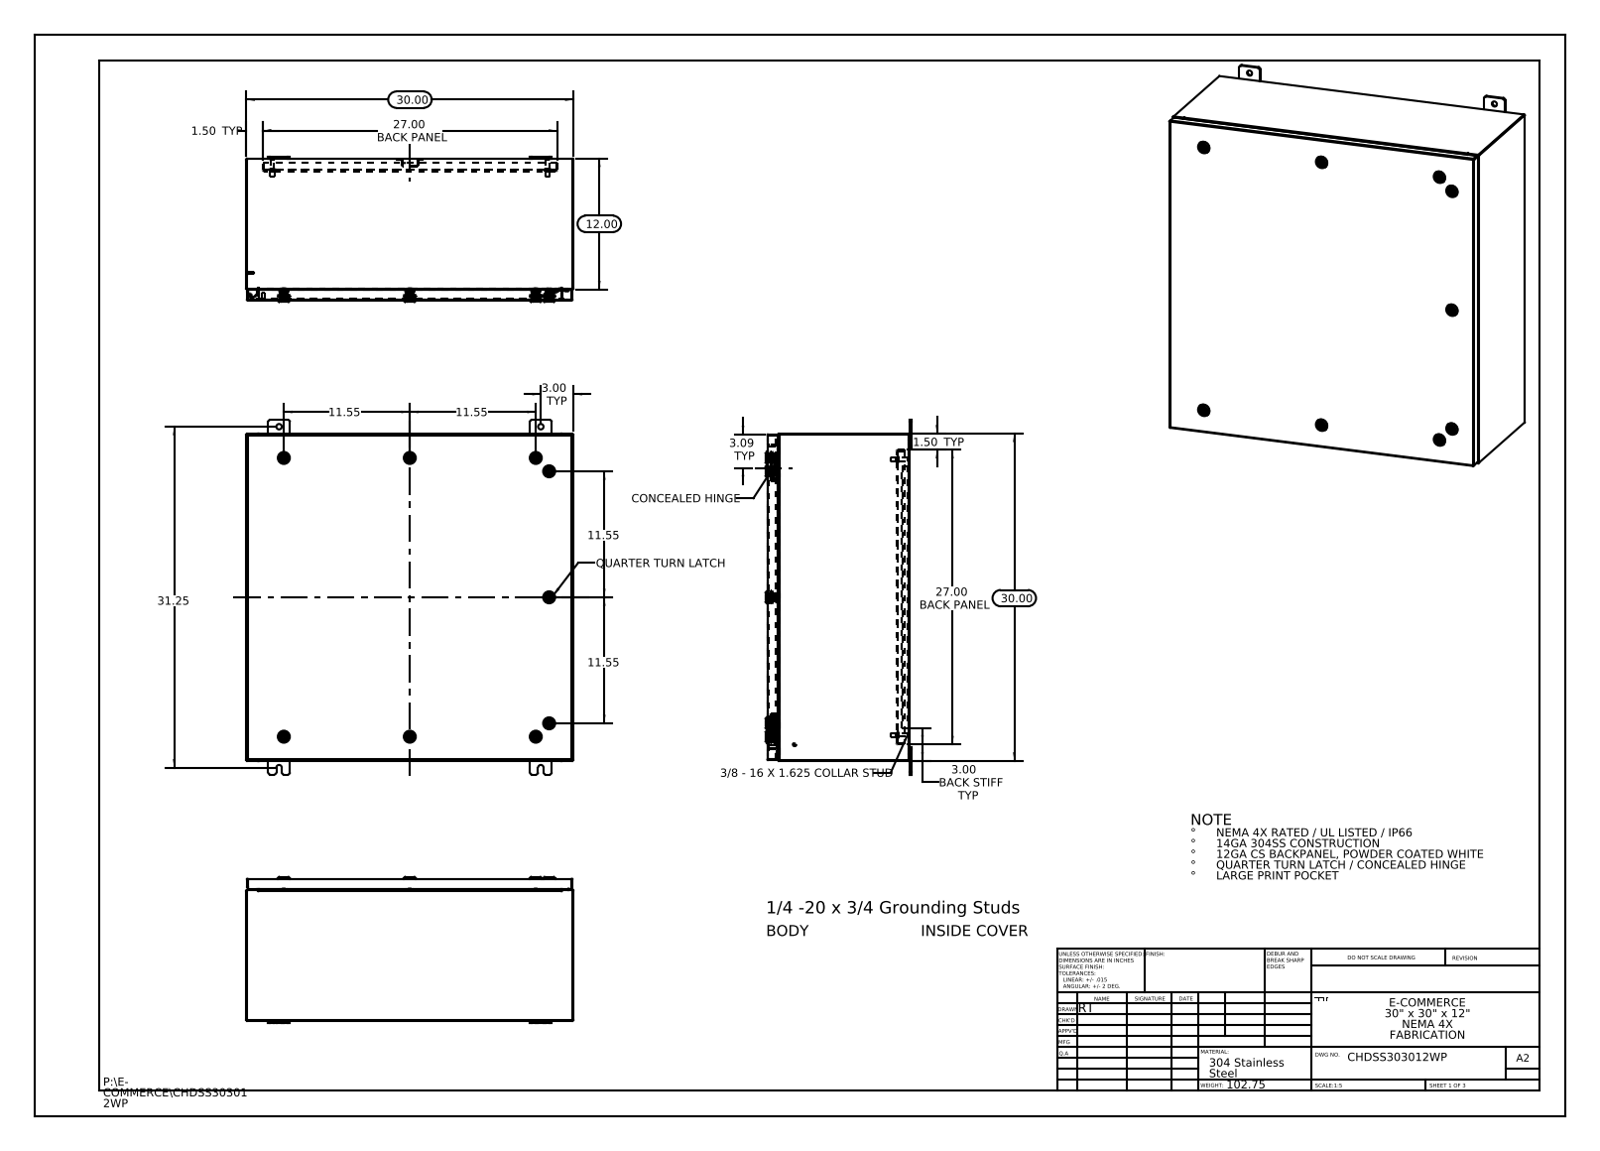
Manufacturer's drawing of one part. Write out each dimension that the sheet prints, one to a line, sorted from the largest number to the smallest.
31.25
30.00
30.00
27.00 BACK PANEL
27.00 BACK PANEL
12.00
11.55
11.55
11.55
11.55
3.09 TYP
3.00 TYP
3.00 BACK STIFF TYP
1.50 TYP
1.50 TYP
